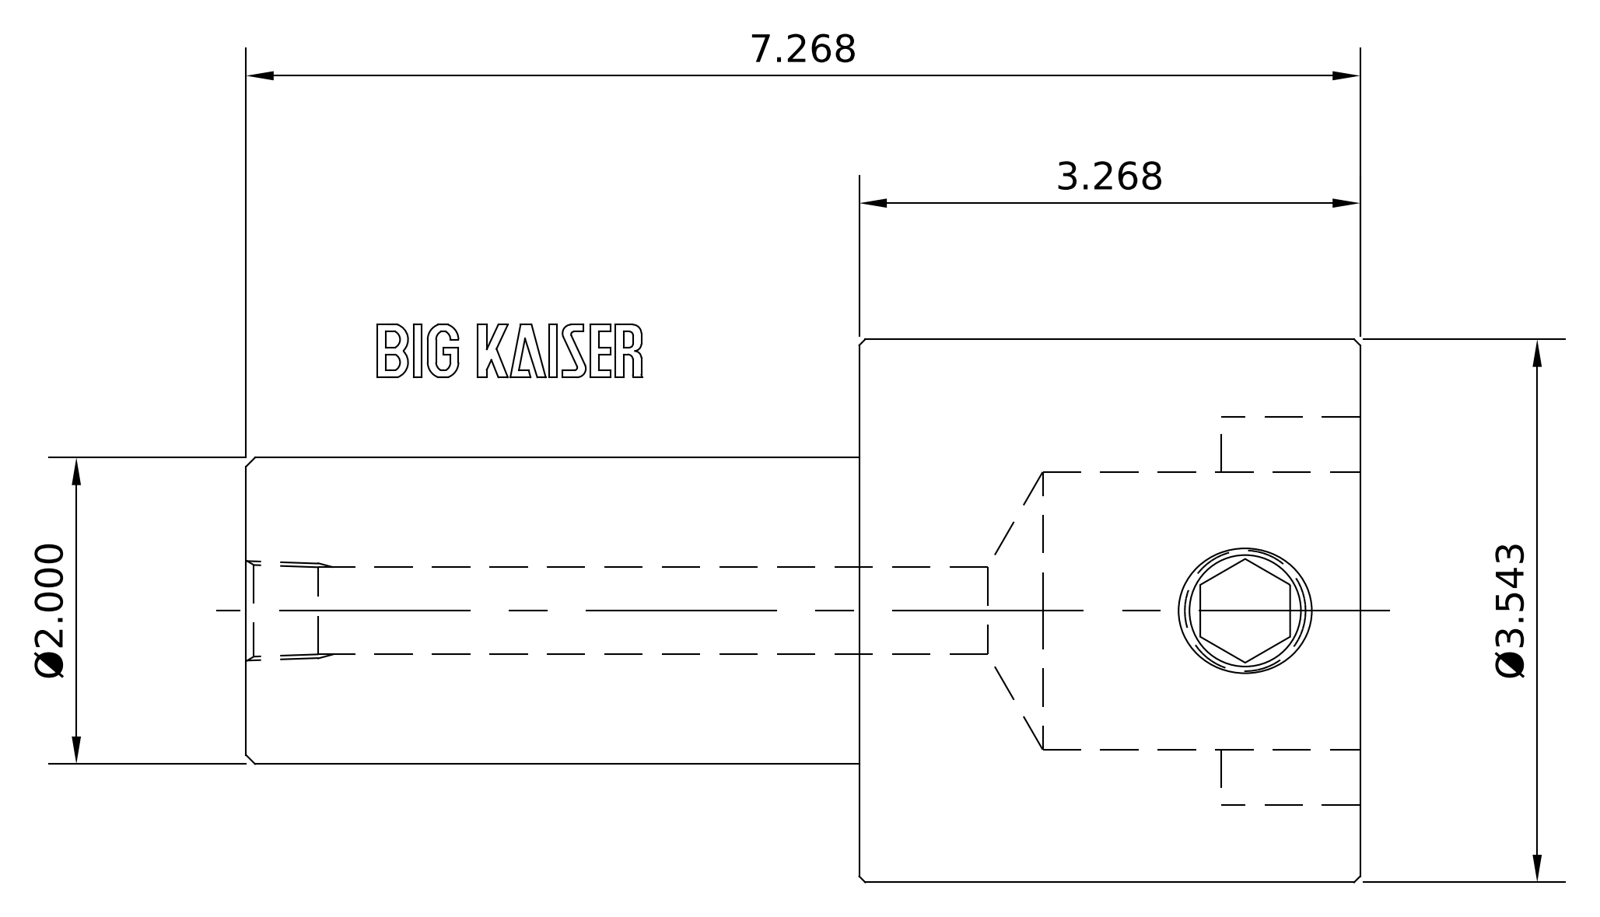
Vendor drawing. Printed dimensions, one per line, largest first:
7.268
Ø3.543
3.268
Ø2.000
